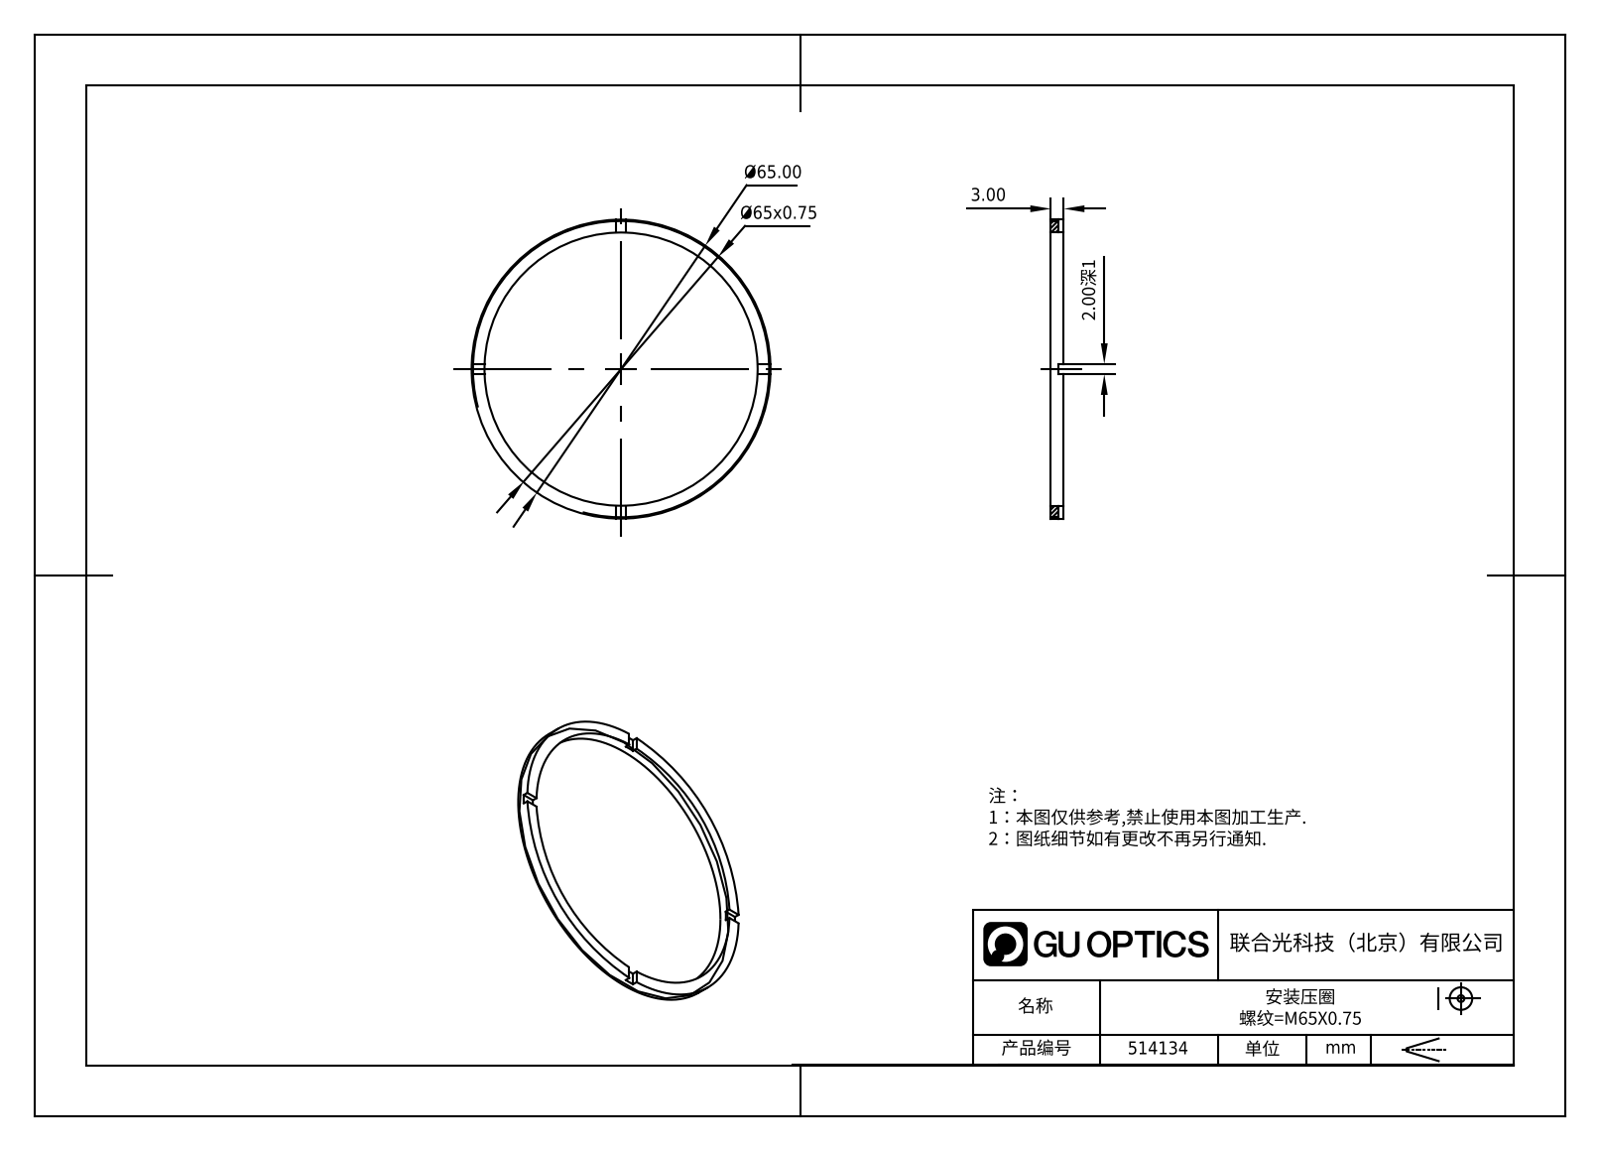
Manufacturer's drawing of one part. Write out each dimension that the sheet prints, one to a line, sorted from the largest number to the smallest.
Ø65.00
Ø65x0.75
3.00
2.00深1
